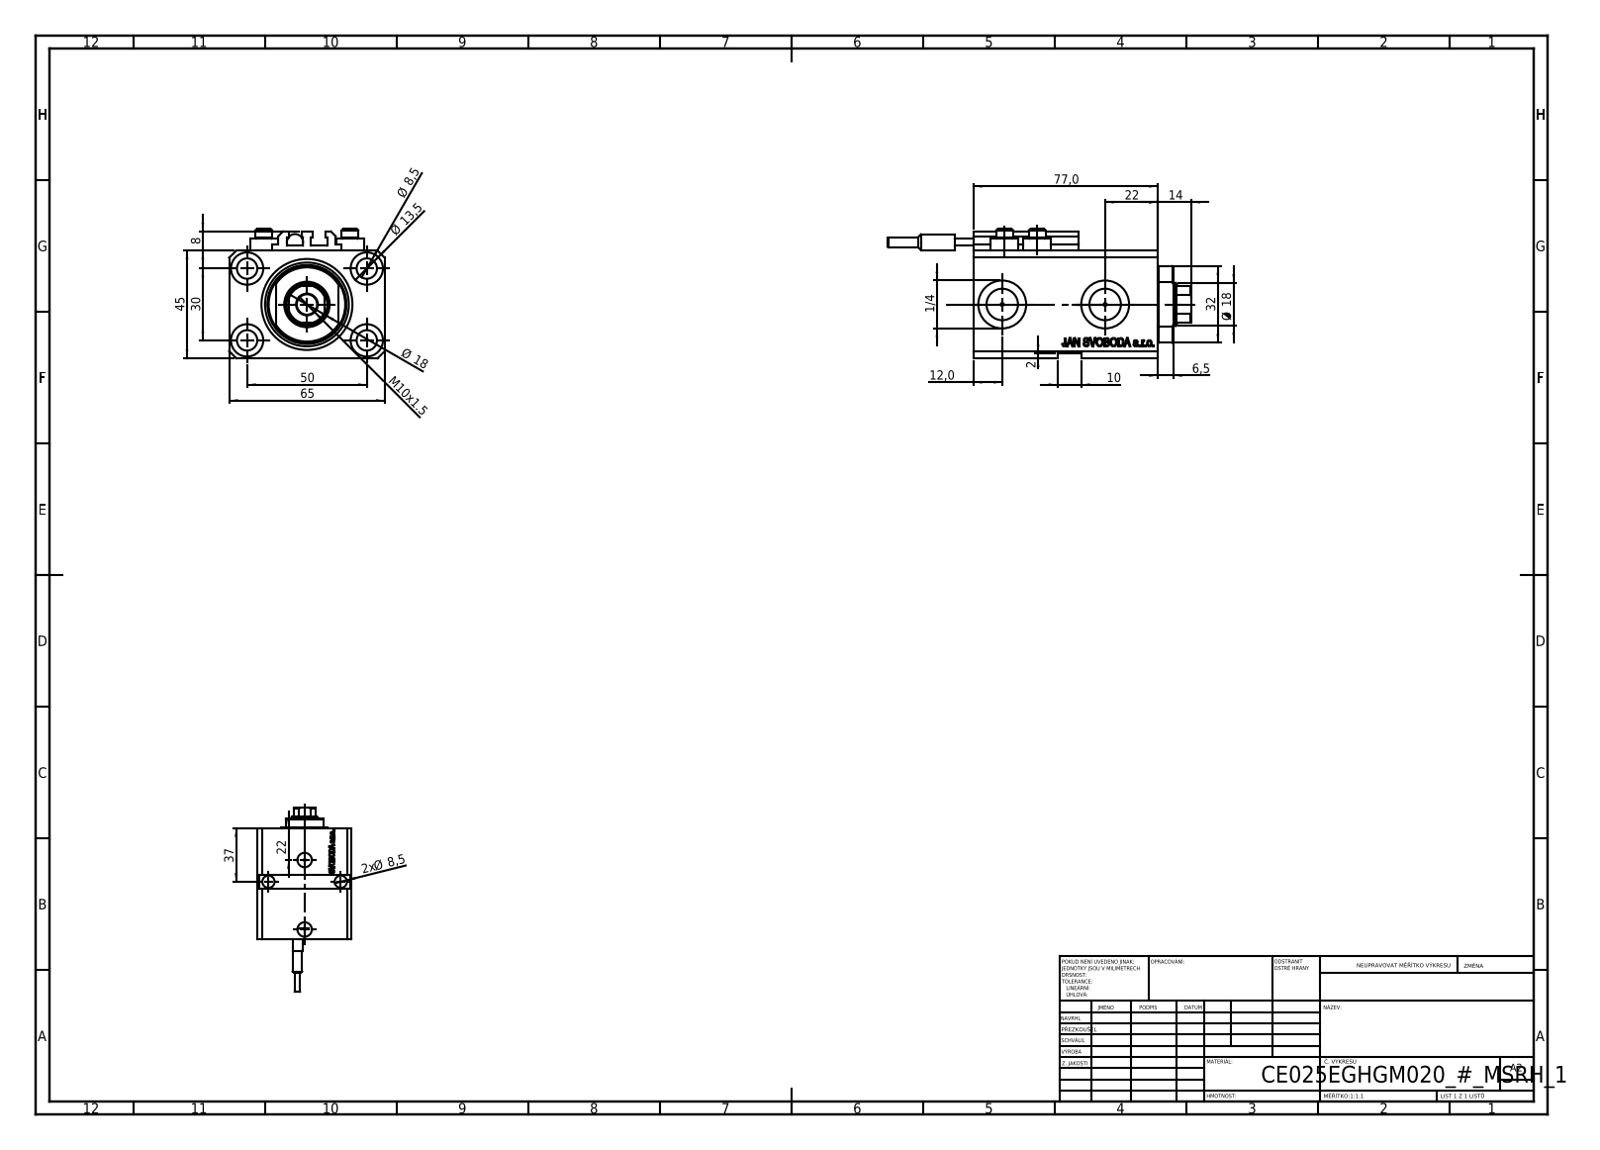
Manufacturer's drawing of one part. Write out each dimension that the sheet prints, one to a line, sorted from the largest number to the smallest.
77,0
65
50
45
37
32
30
22
22
Ø 18
Ø 18
14
Ø 13,5
12,0
M10x1.5
10
Ø 8,5
2x Ø 8,5
8
6,5
2
1/4
